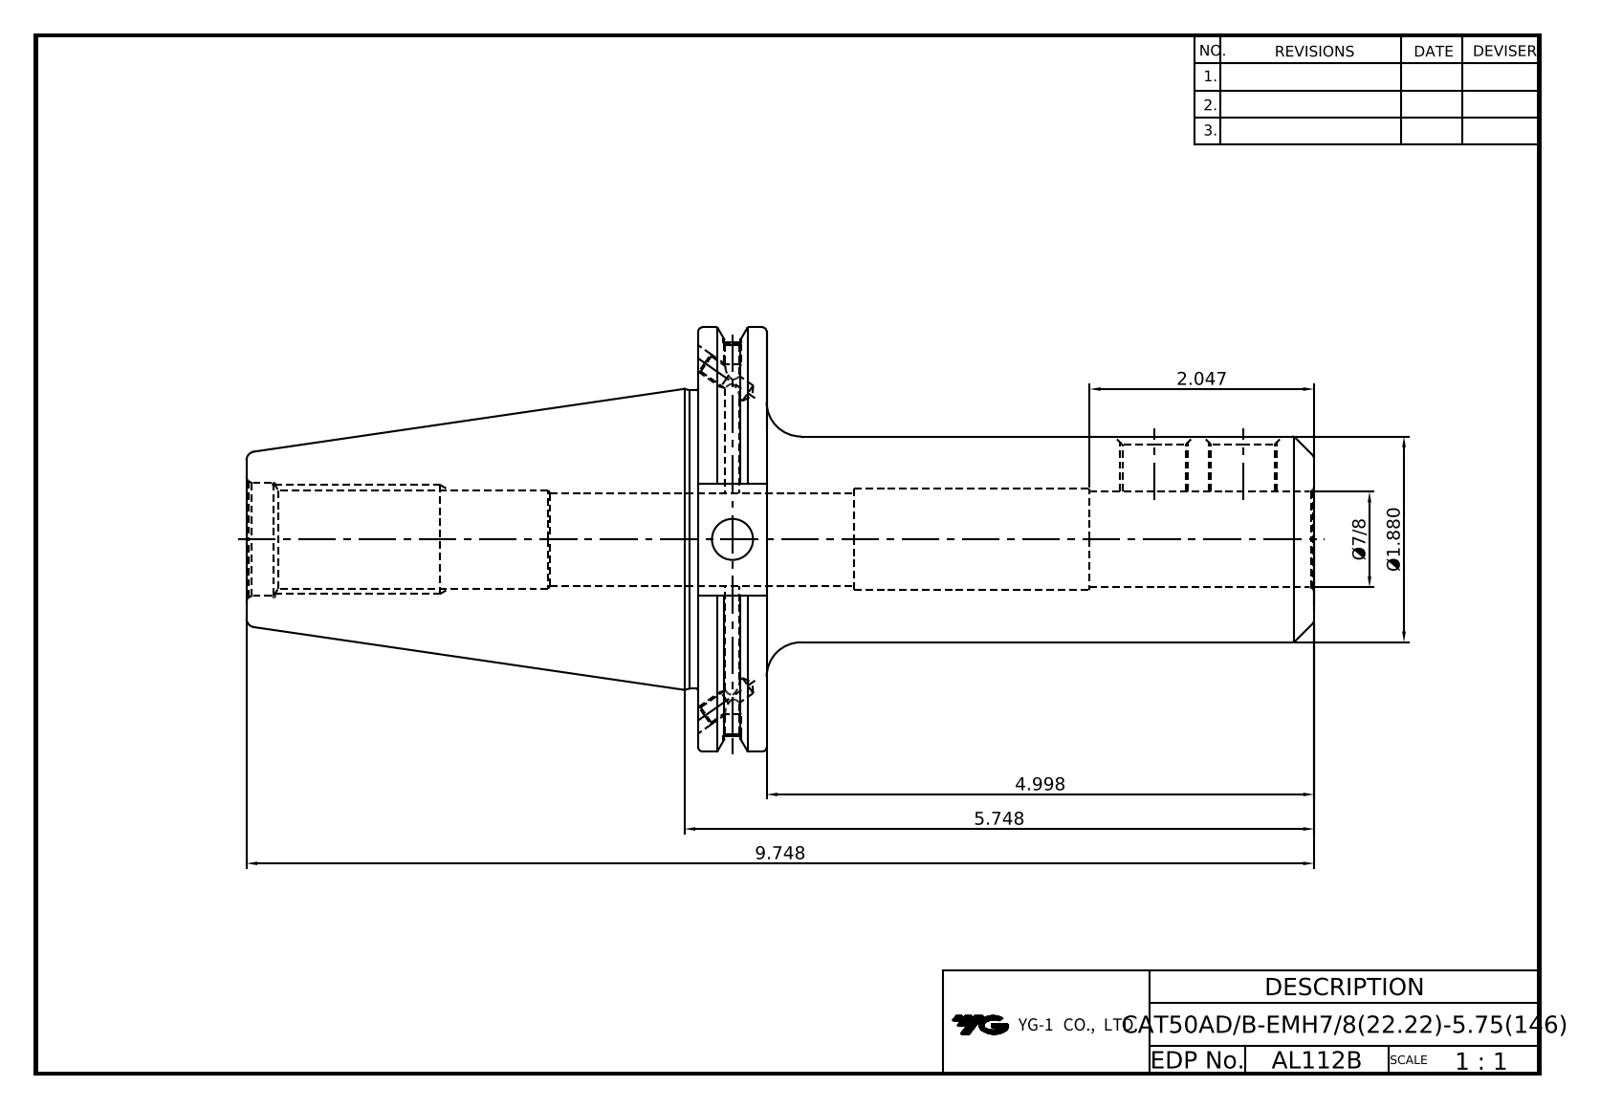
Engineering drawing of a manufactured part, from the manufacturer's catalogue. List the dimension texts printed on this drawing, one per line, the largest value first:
9.748
5.748
4.998
2.047
Ø1.880
Ø7/8
